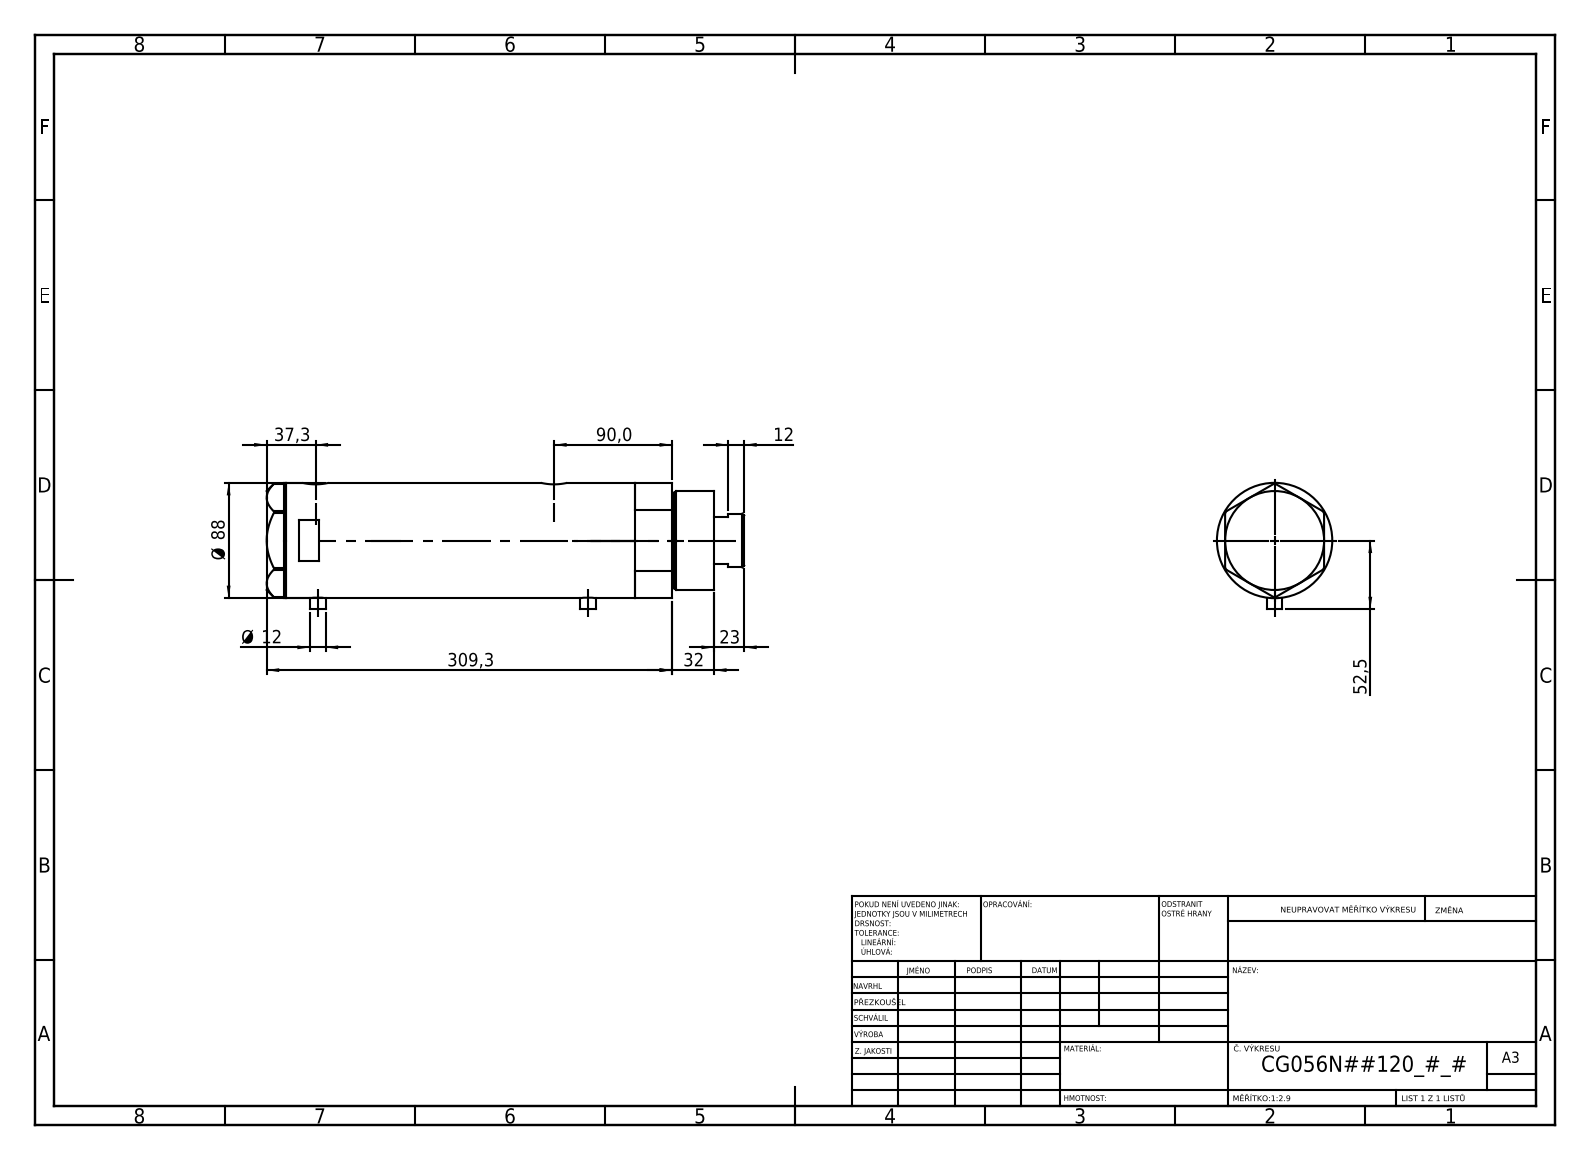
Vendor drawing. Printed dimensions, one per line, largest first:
309,3
90,0
Ø 88
52,5
37,3
32
23
12
Ø 12
